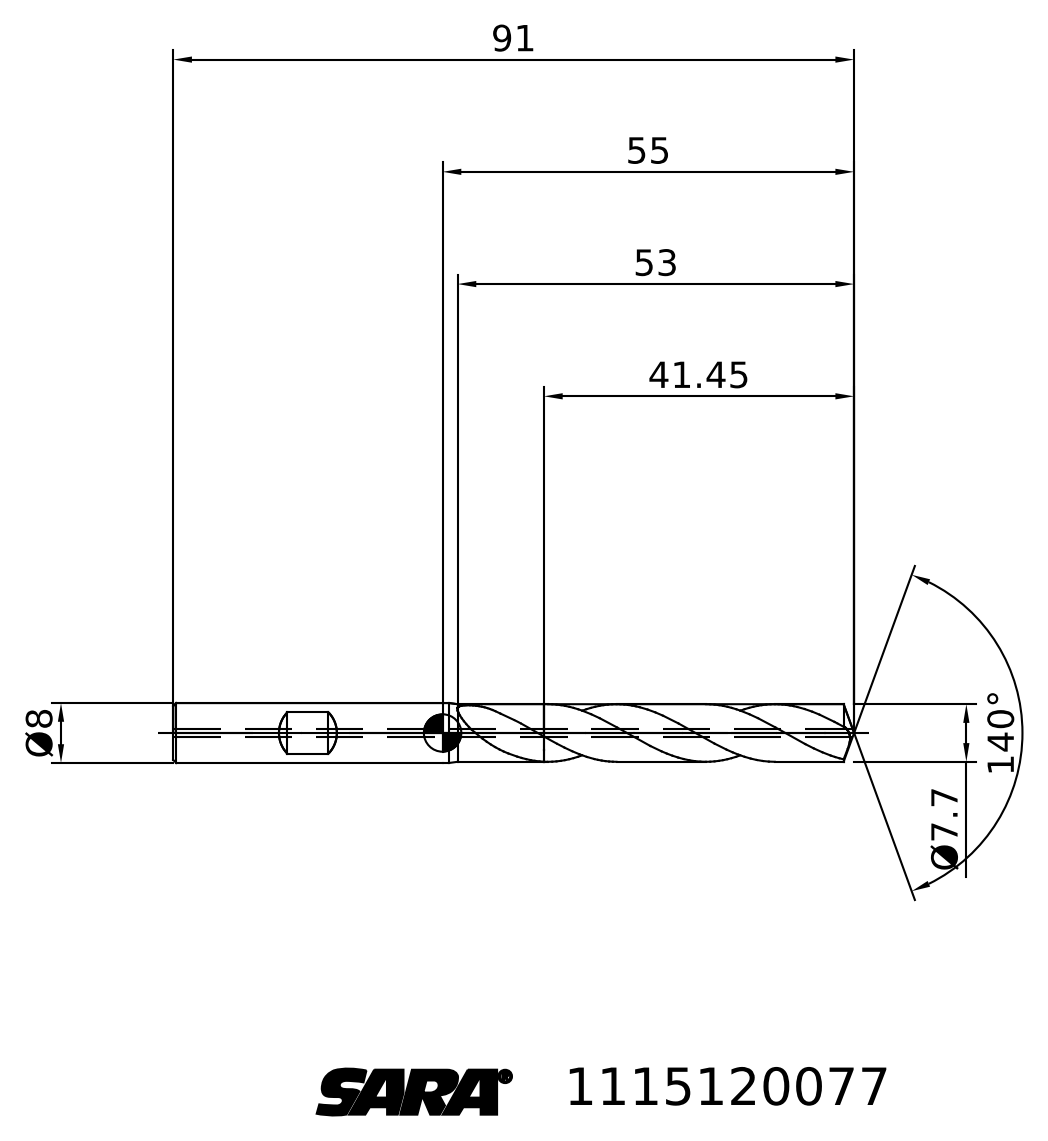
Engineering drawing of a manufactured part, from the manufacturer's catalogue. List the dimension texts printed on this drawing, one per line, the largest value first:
140°
91
55
53
41.45
Ø8
Ø7.7
